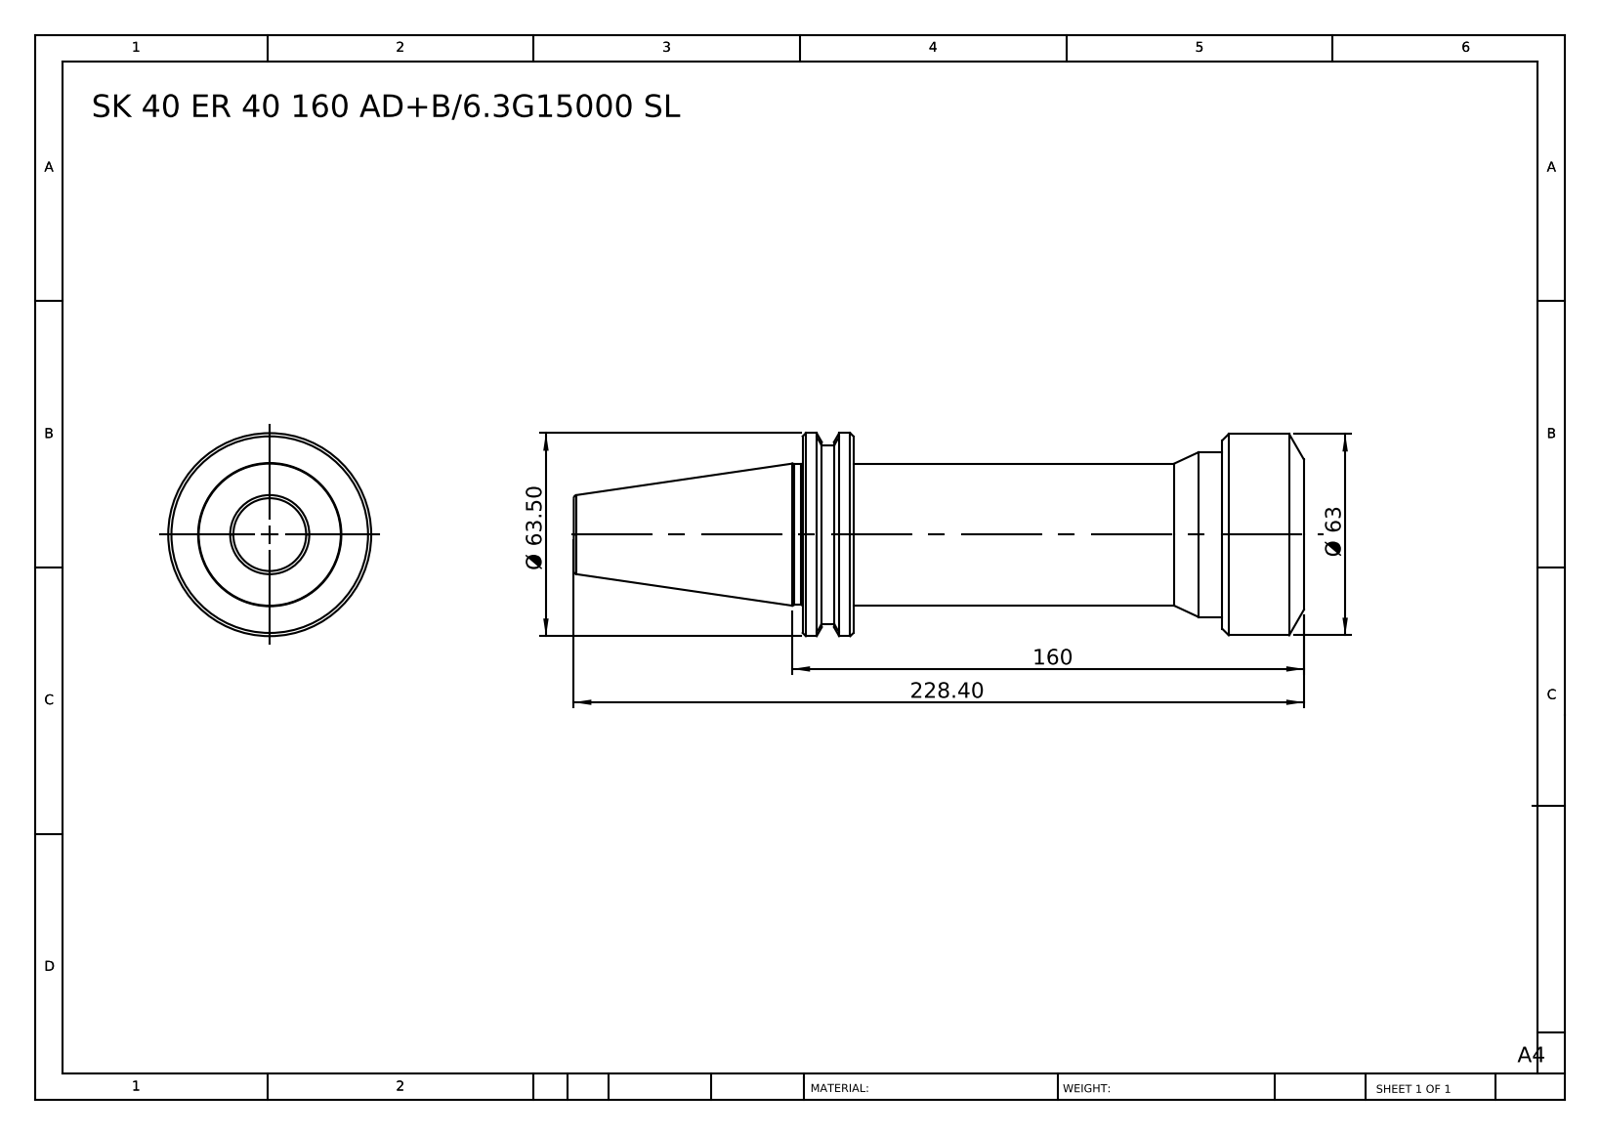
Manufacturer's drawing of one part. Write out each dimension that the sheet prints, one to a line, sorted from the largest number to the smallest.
228.40
160
Ø 63.50
Ø 63
